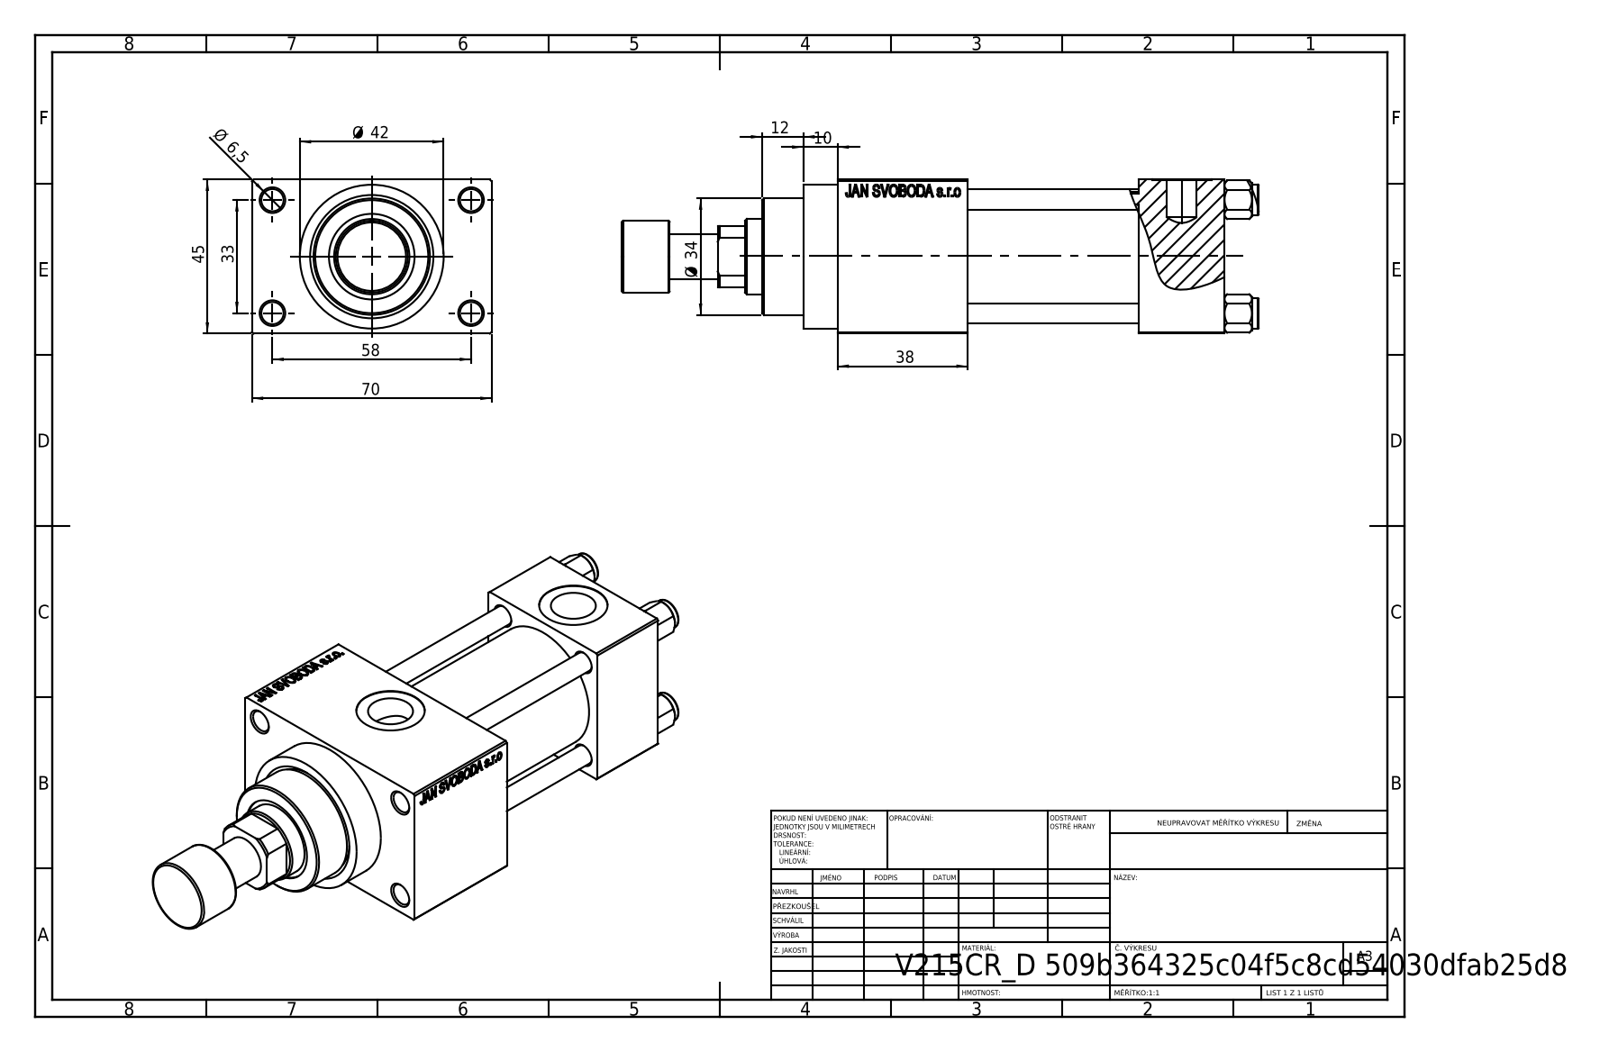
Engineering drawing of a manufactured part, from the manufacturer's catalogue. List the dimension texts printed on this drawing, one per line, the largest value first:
70
58
45
Ø 42
38
Ø 34
33
12
10
Ø 6,5
